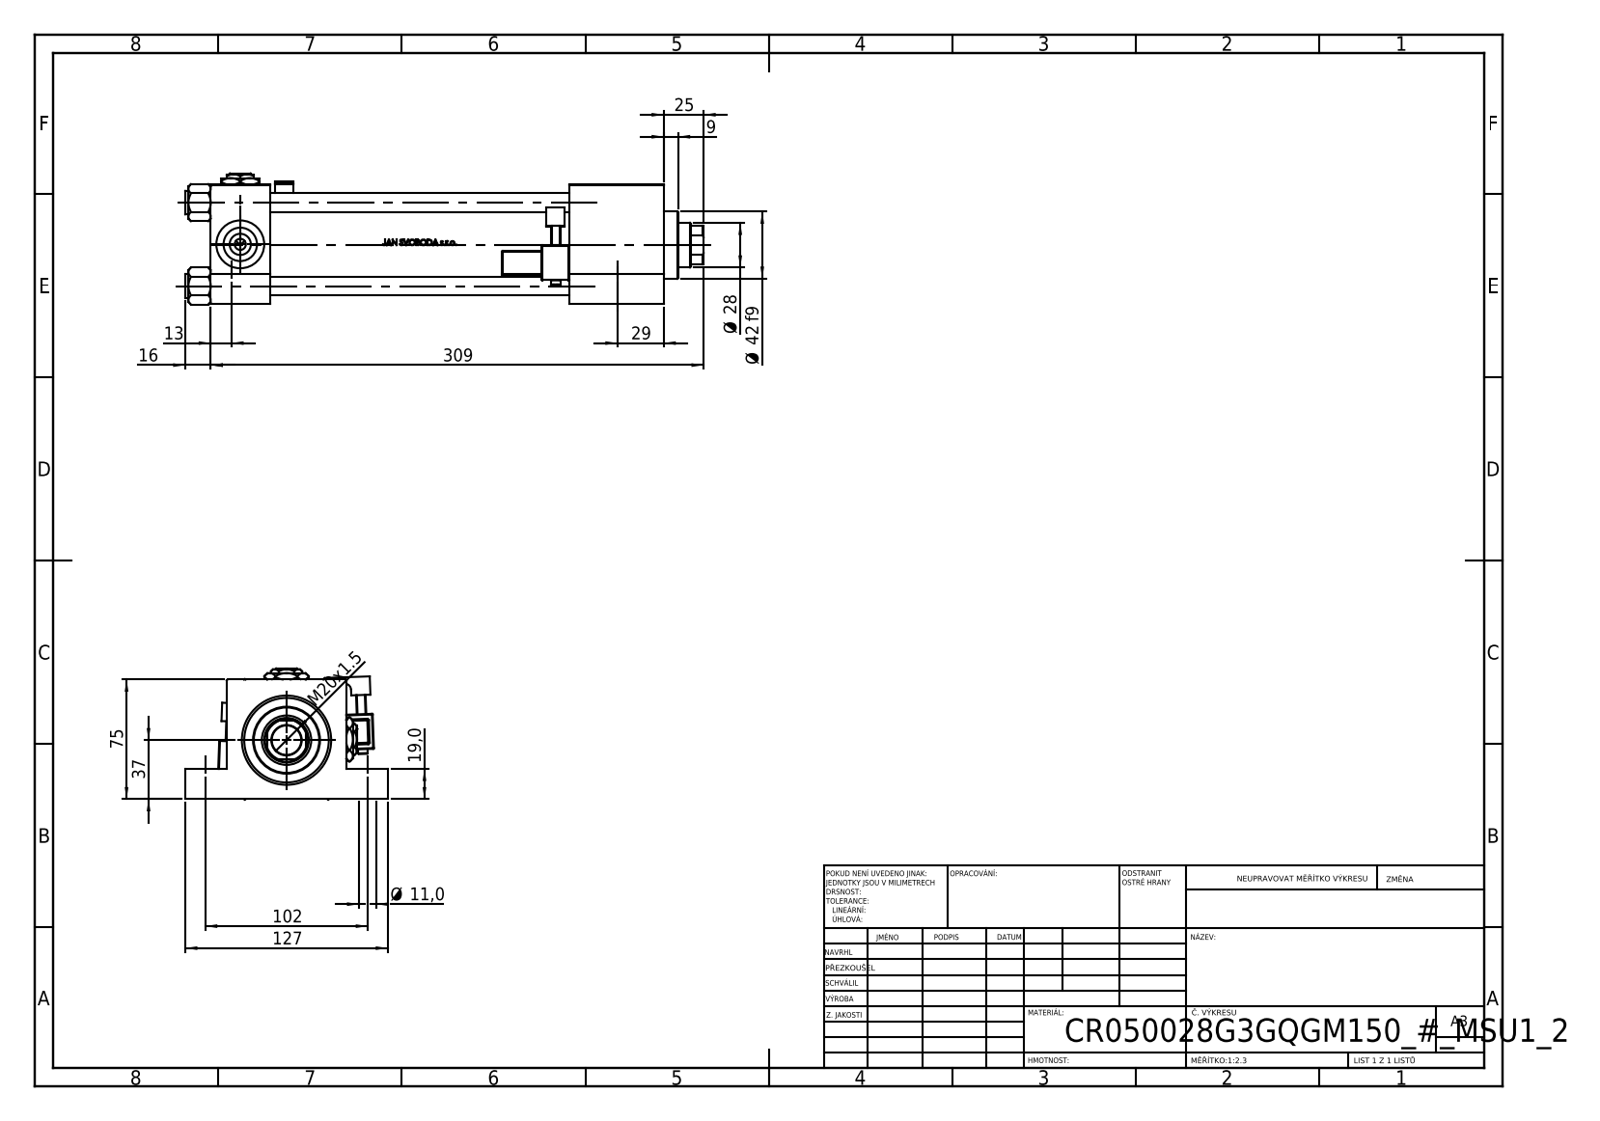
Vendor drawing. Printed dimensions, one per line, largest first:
309
127
102
75
Ø 42 f9
37
29
Ø 28
25
M20x1.5
19,0
16
13
Ø 11,0
9
